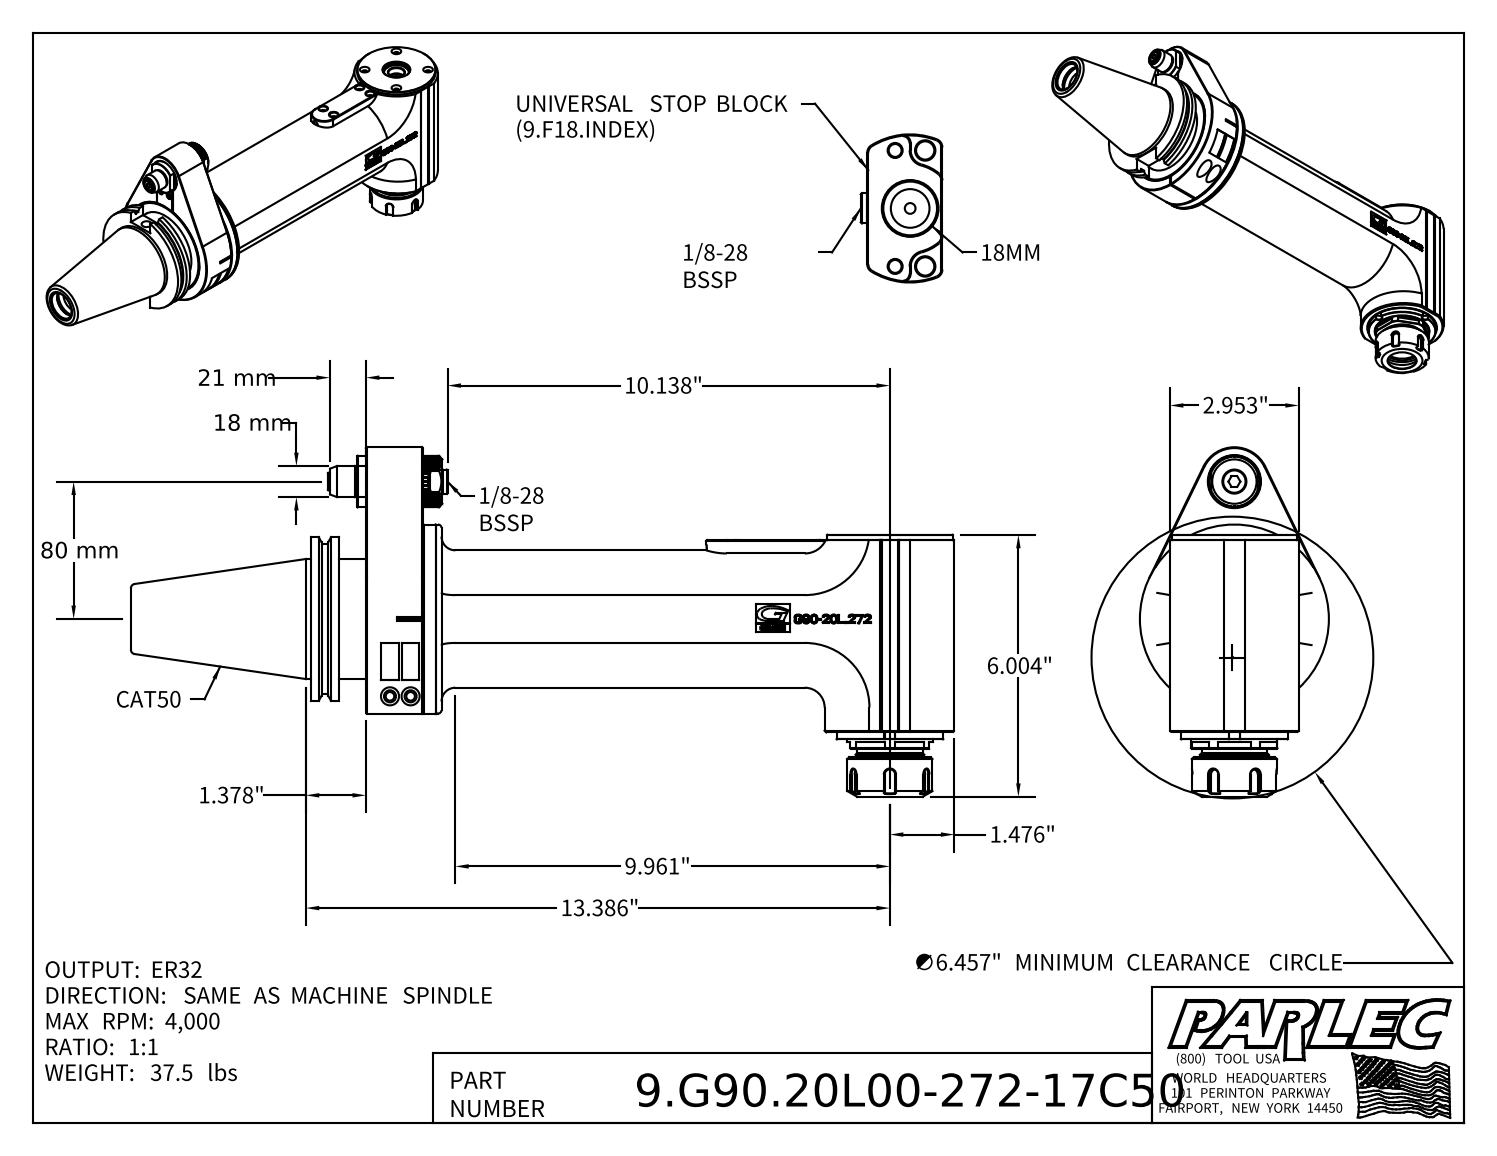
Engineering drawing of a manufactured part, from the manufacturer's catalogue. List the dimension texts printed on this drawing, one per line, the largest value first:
80 mm
21 mm
18 mm
13.386"
10.138"
9.961"
∅6.457" MINIMUM CLEARANCE CIRCLE
6.004"
2.953"
1.476"
1.378"
